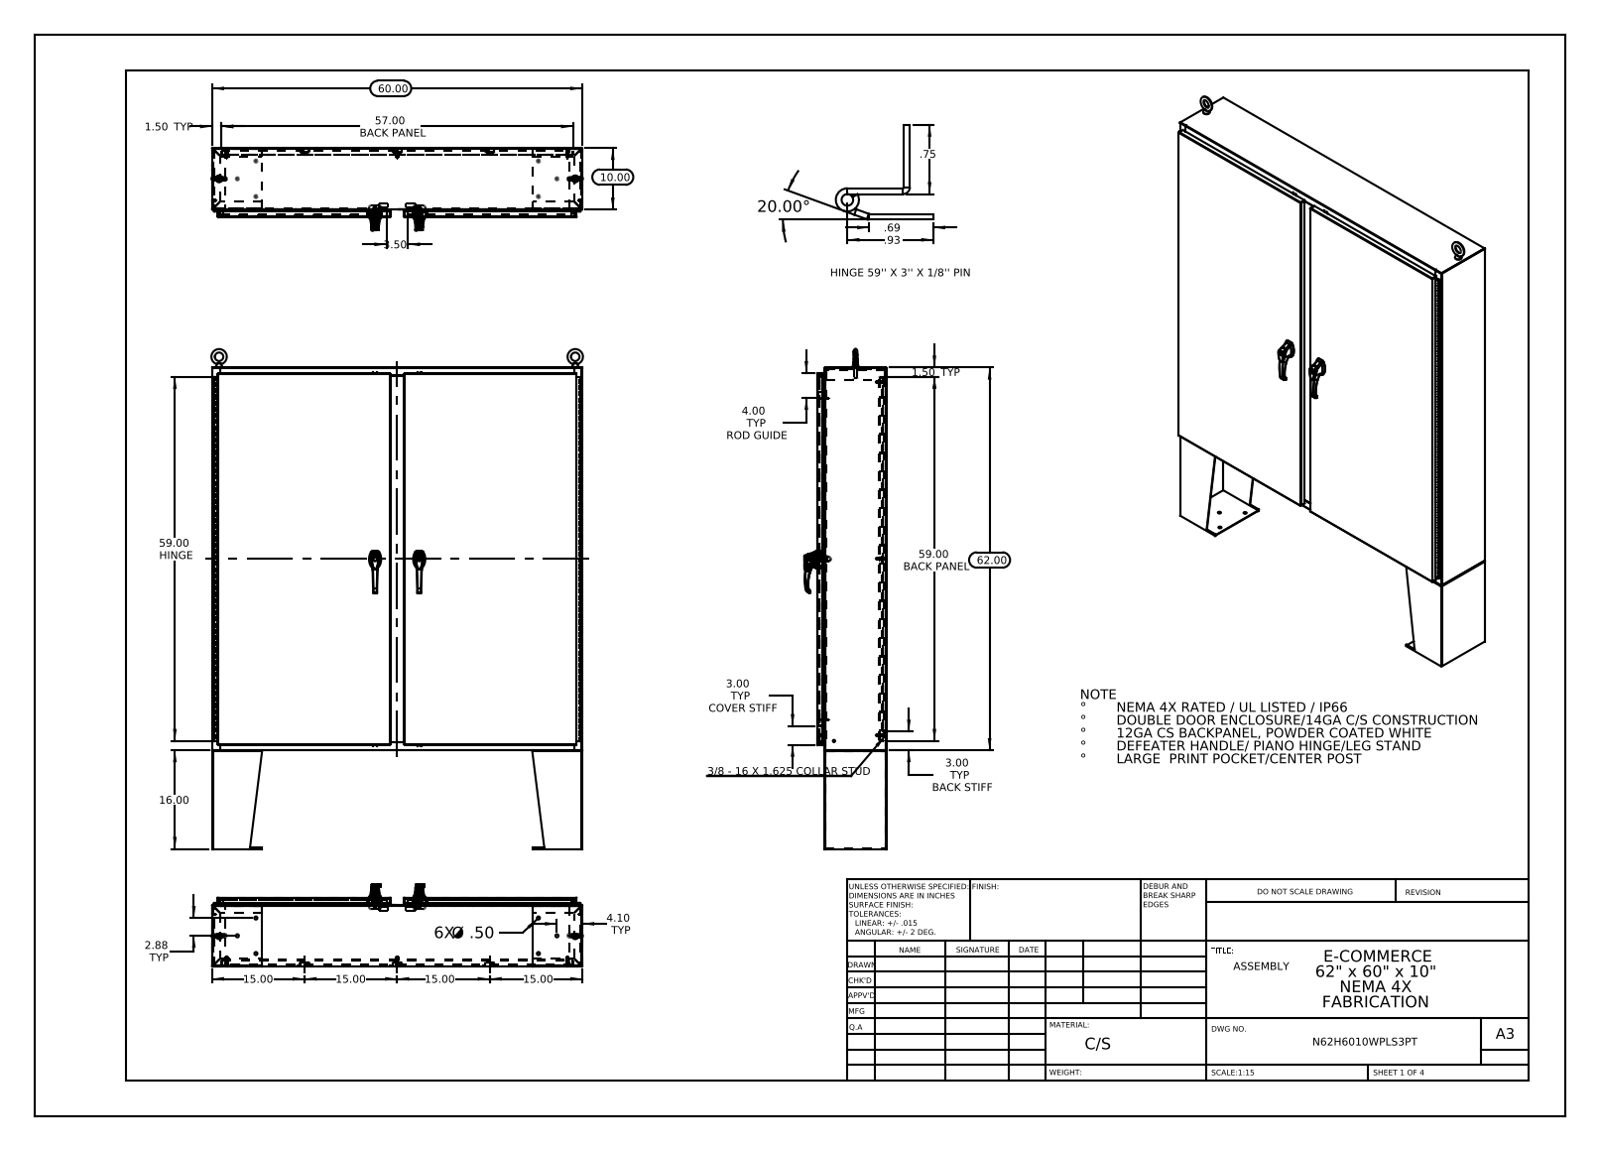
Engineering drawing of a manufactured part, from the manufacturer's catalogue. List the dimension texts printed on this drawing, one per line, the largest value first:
62.00
60.00
59.00 HINGE
59.00 BACK PANEL
57.00 BACK PANEL
20.00°
16.00
15.00
15.00
15.00
15.00
10.00
4.10 TYP
4.00 TYP ROD GUIDE
3.50
3.00 TYP BACK STIFF
3.00 TYP COVER STIFF
2.88 TYP
1.50 TYP
1.50 TYP
.93
.75
.69
6X Ø .50
